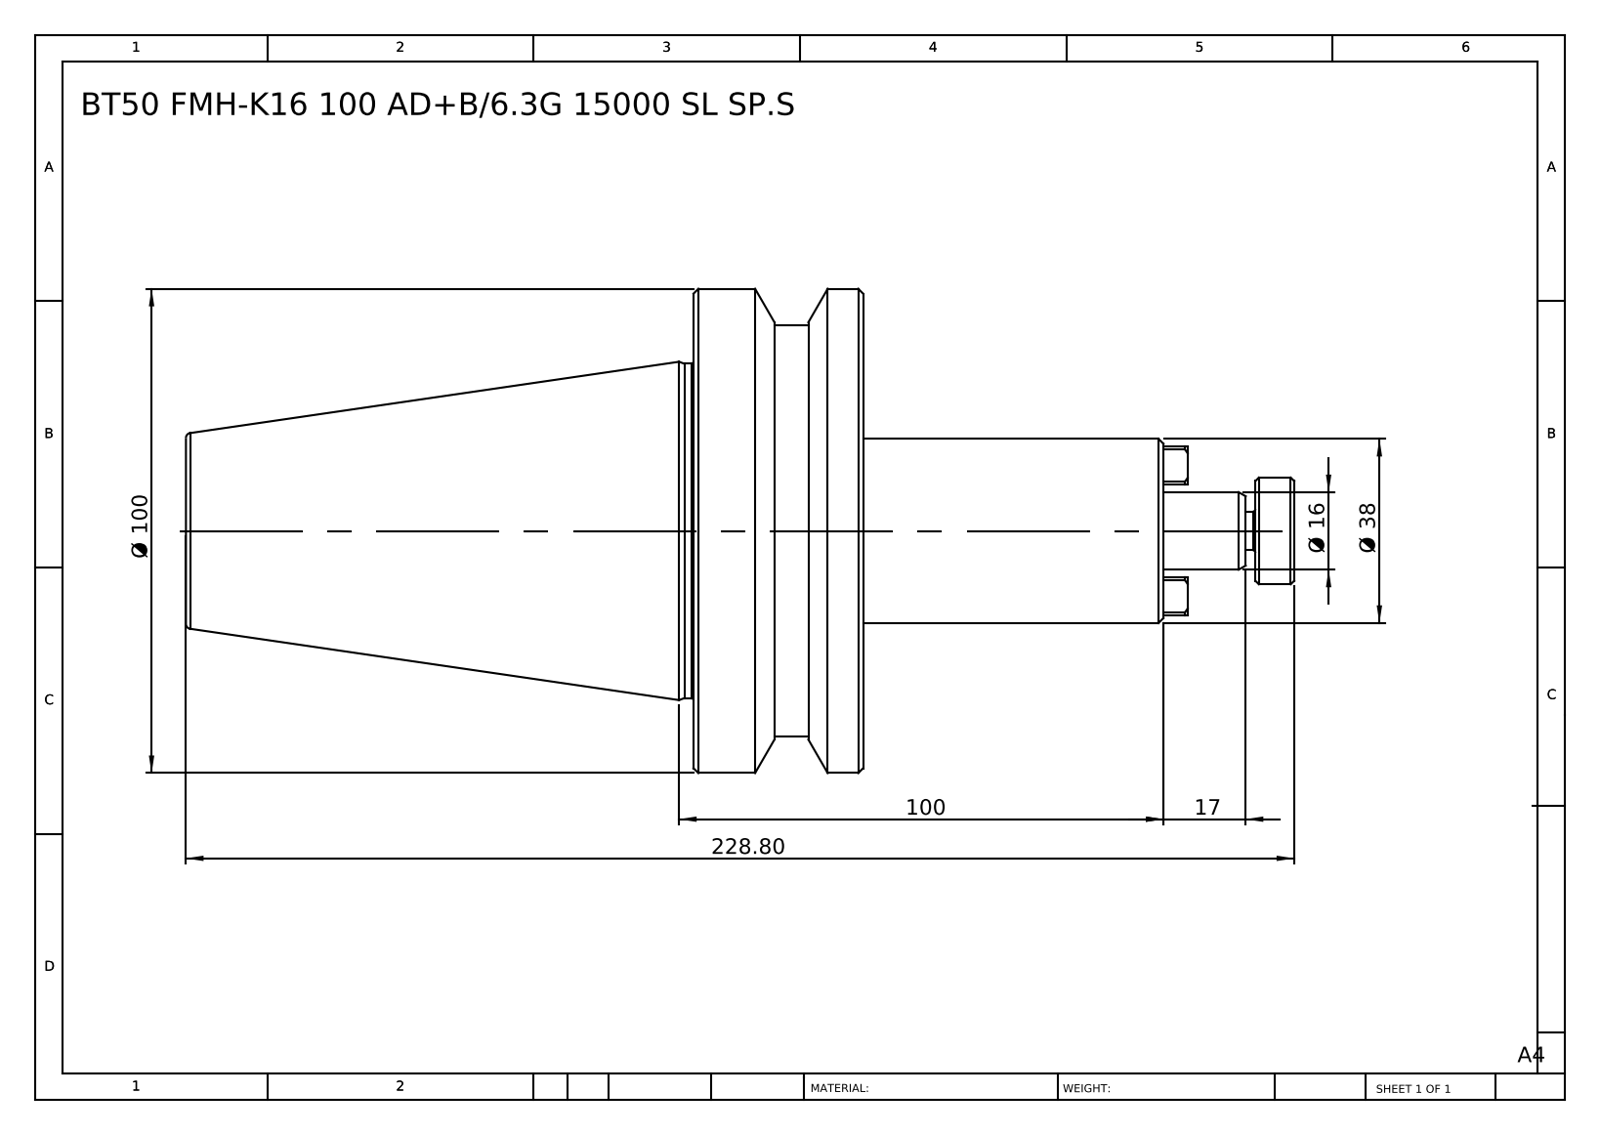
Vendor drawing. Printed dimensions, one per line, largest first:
228.80
100
Ø 100
Ø 38
17
Ø 16
